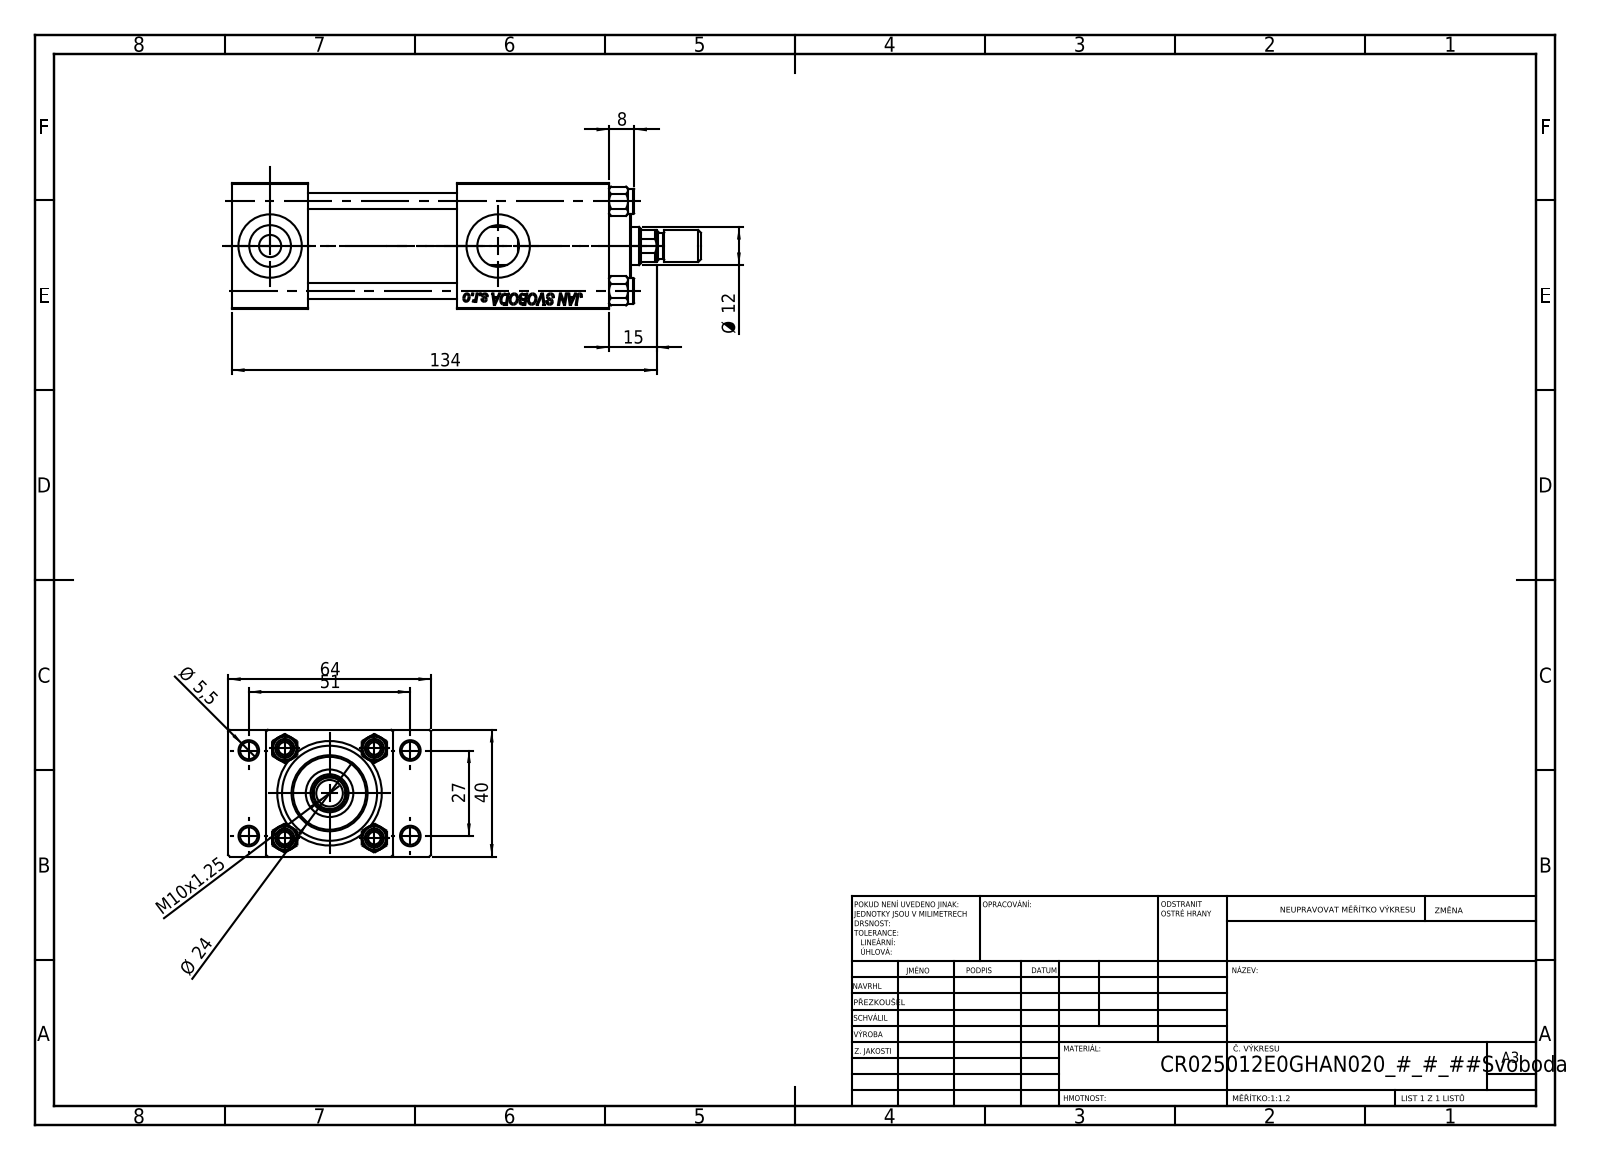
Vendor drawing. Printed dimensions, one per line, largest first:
134
64
51
40
27
Ø 24
15
Ø 12
M10x1.25
8
Ø 5,5
